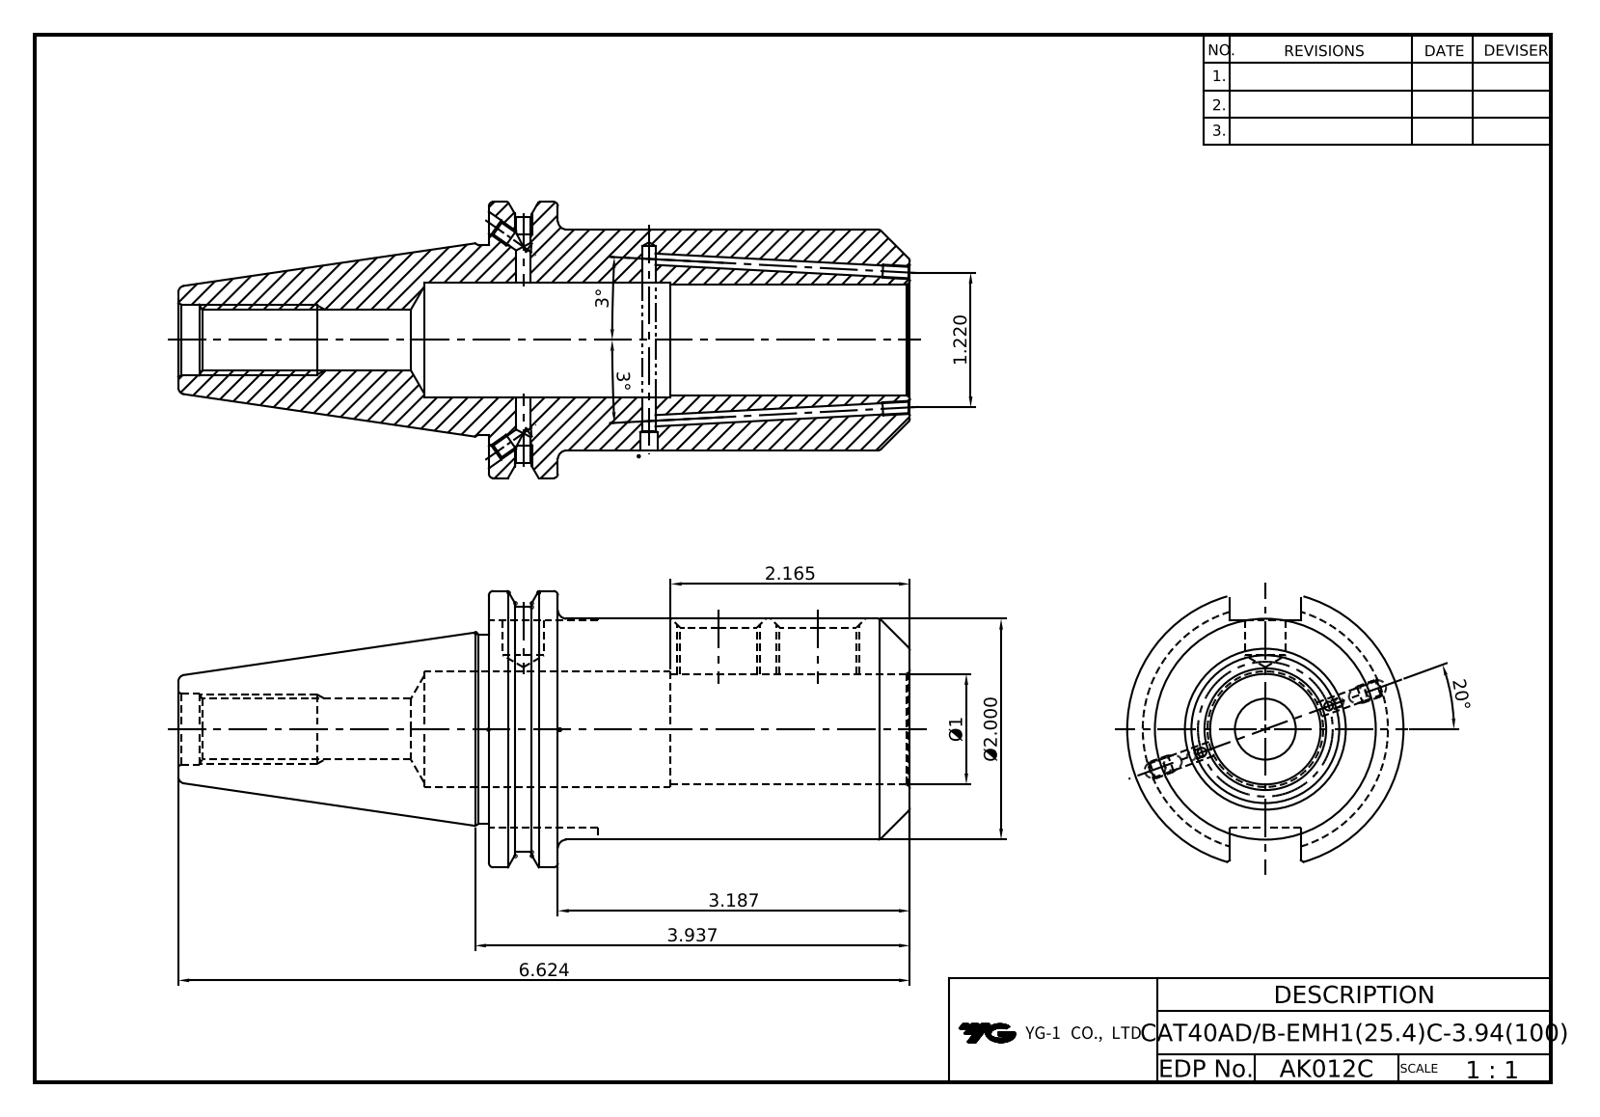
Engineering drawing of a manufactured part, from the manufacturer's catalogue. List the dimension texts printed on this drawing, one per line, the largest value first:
20°
6.624
3.937
3.187
3°
3°
2.165
Ø2.000
1.220
Ø1
